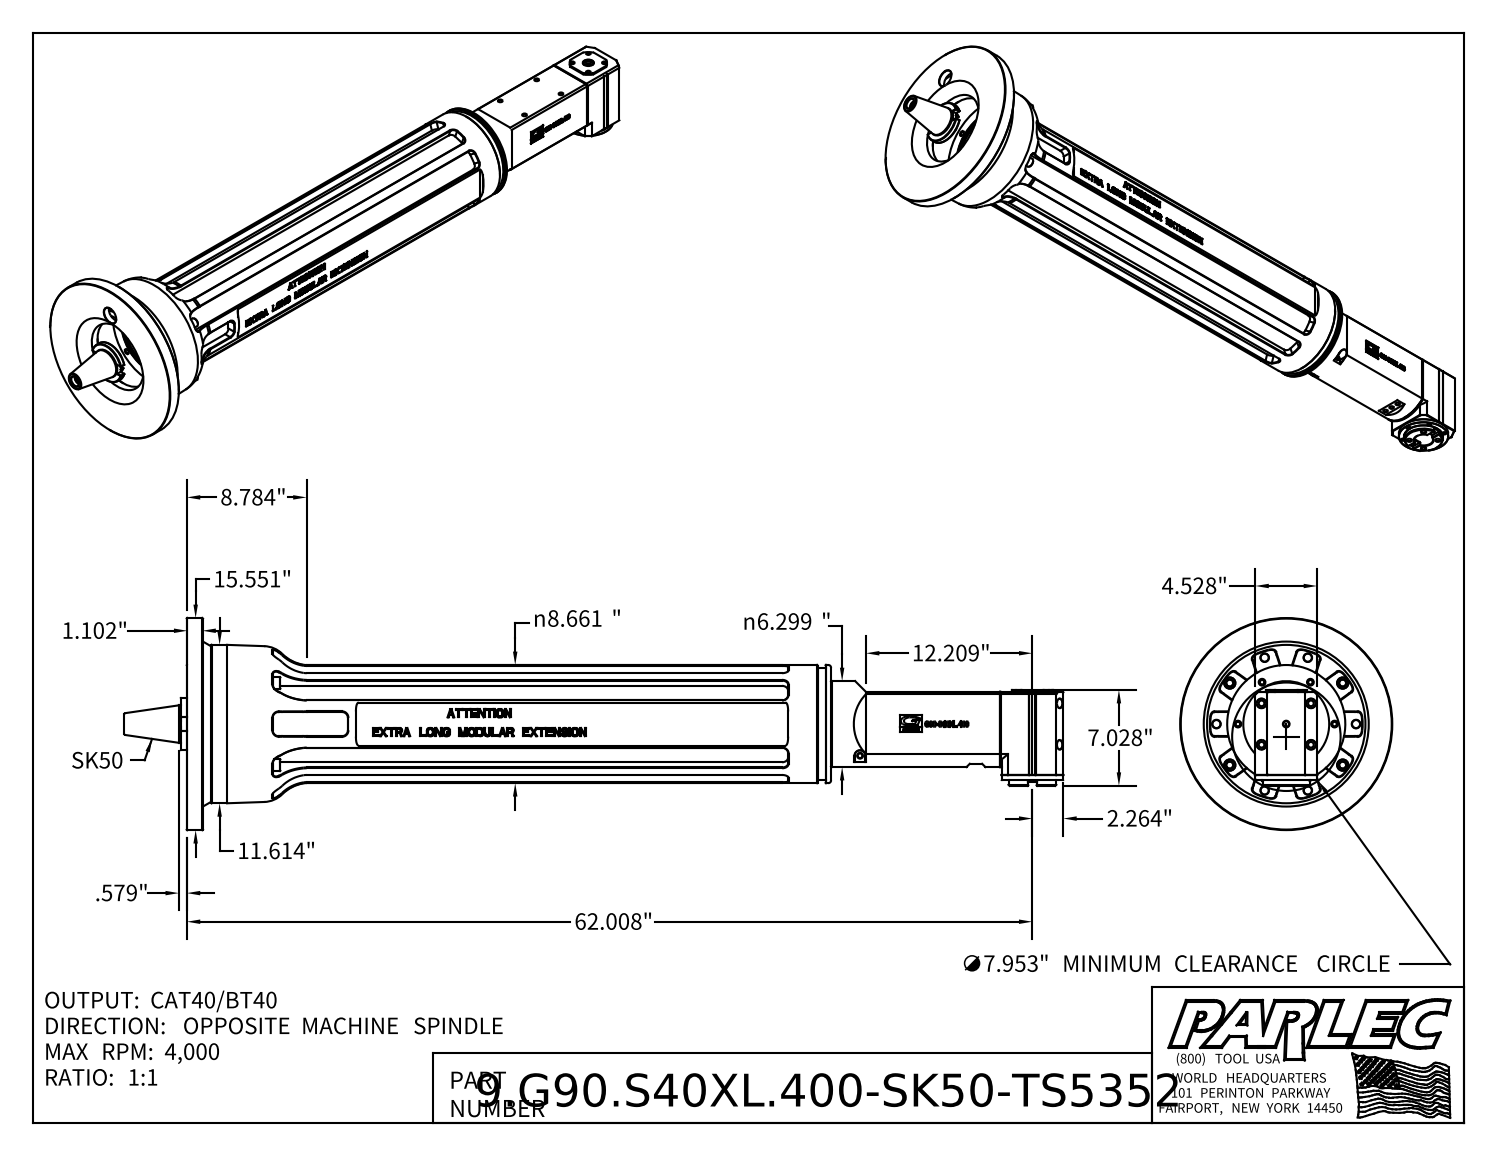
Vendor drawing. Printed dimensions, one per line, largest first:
62.008"
15.551"
12.209"
11.614"
8.784"
n8.661"
∅7.953" MINIMUM CLEARANCE CIRCLE
7.028"
n6.299"
4.528"
2.264"
1.102"
.579"
